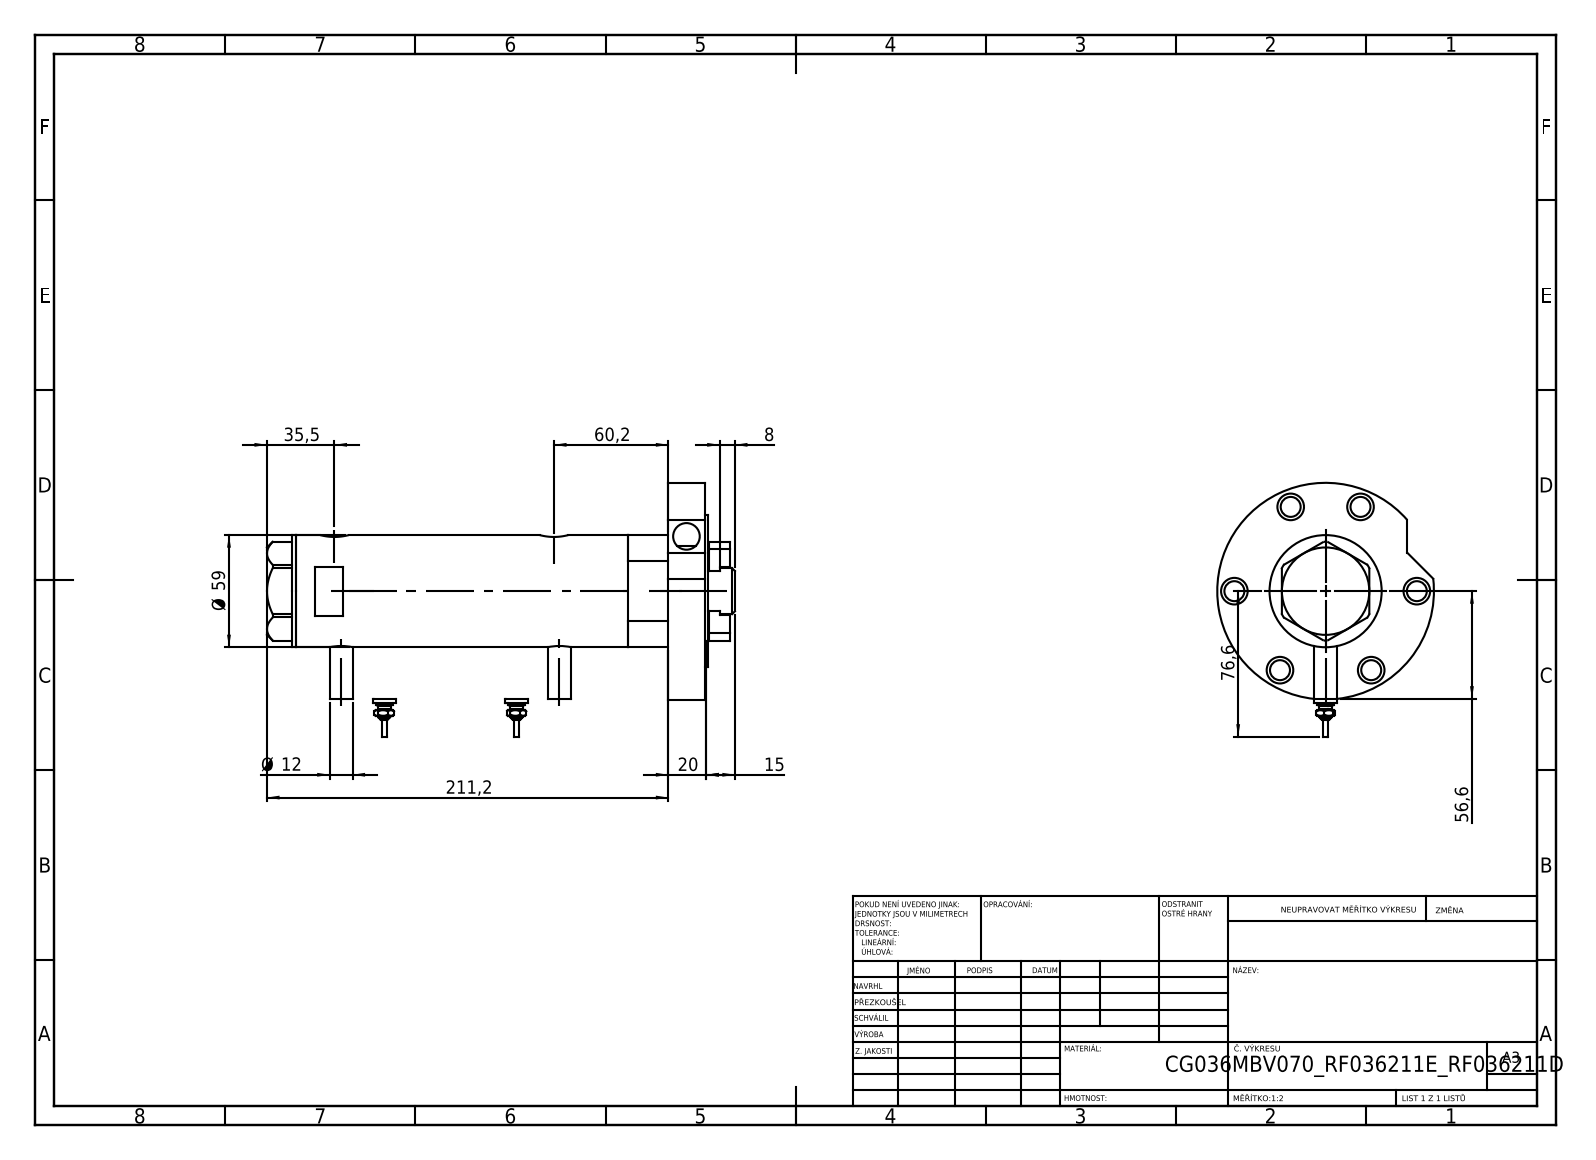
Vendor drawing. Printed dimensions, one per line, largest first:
211,2
76,6
60,2
Ø 59
56,6
35,5
20
15
Ø 12
8
